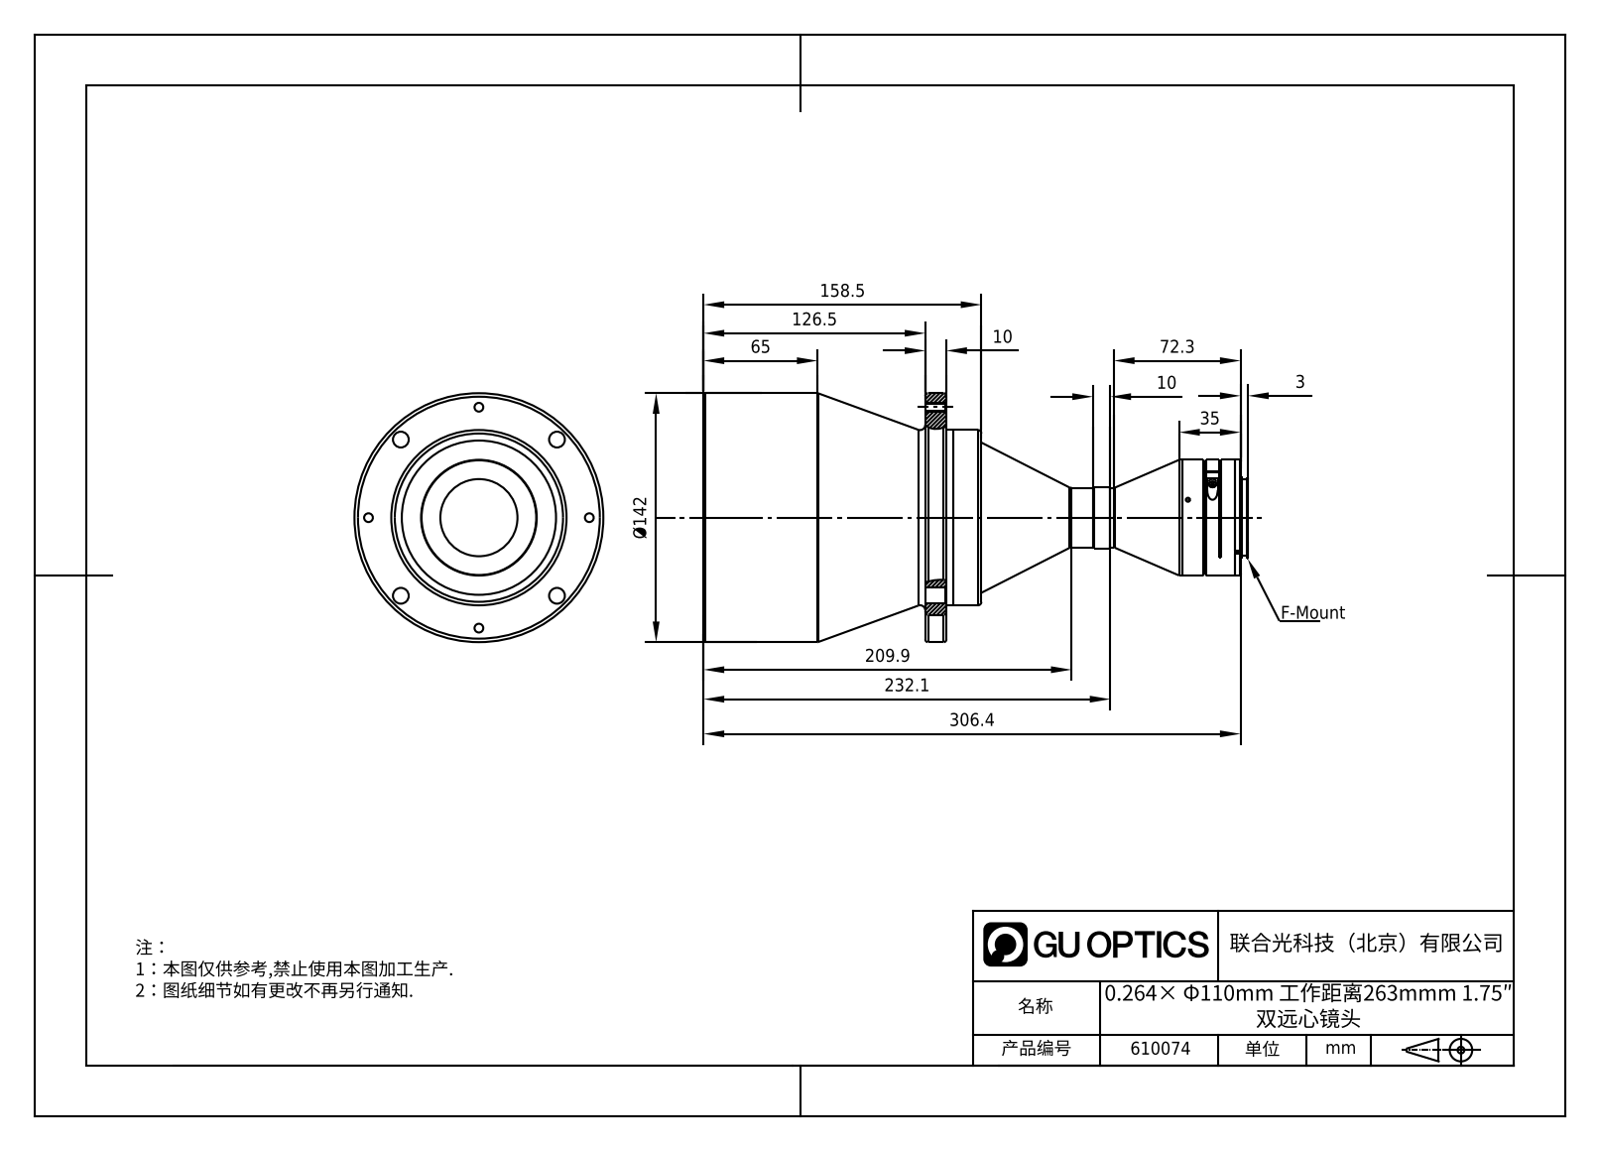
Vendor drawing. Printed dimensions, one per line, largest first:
306.4
232.1
209.9
158.5
Ø142
126.5
72.3
65
35
10
10
3
